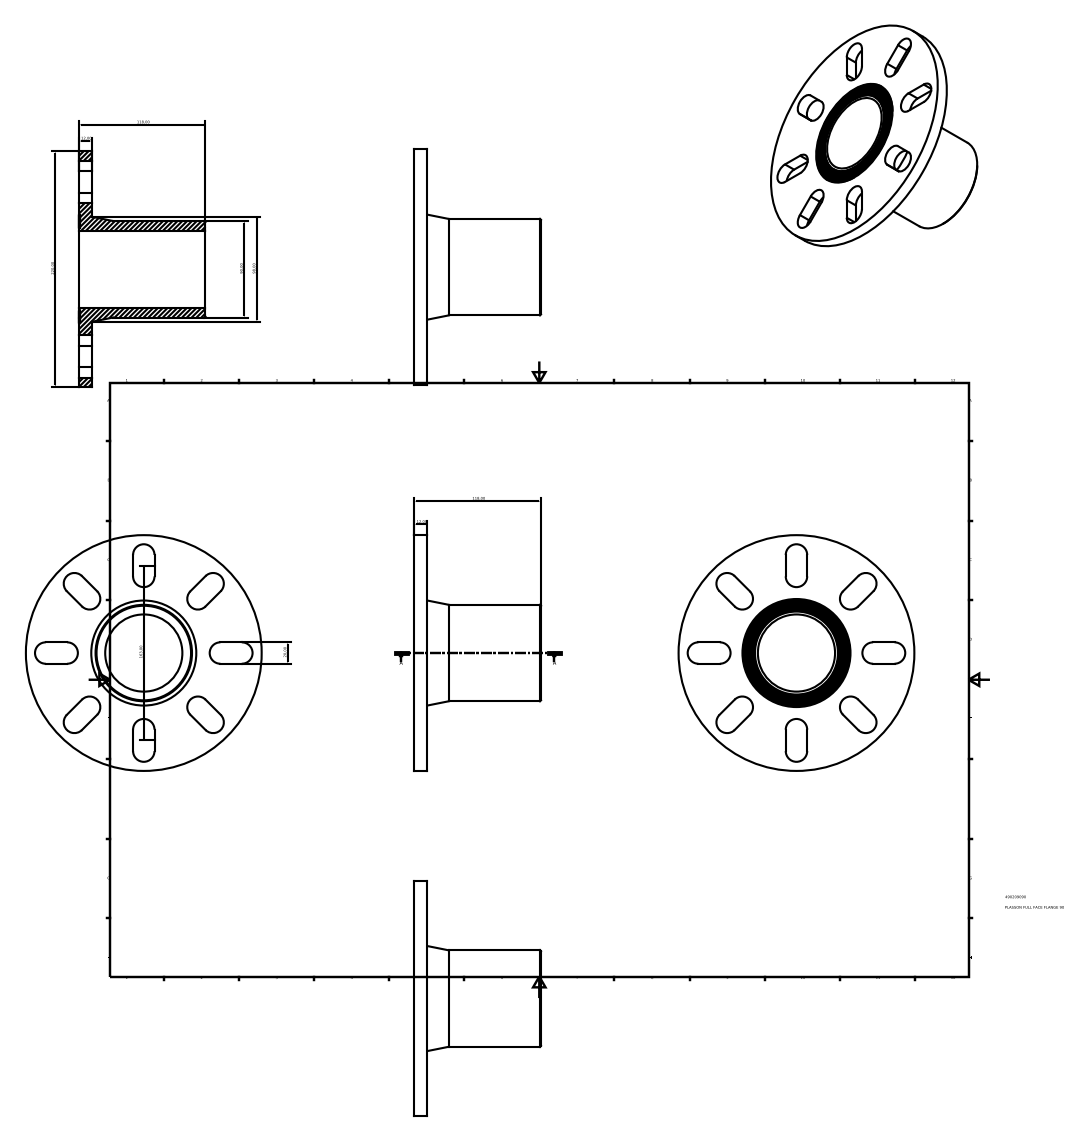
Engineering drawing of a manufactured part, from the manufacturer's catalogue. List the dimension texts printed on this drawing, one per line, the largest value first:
220,00
163,00
118,00
118,00
98,00
90,00
20,00
12,00
12,00
